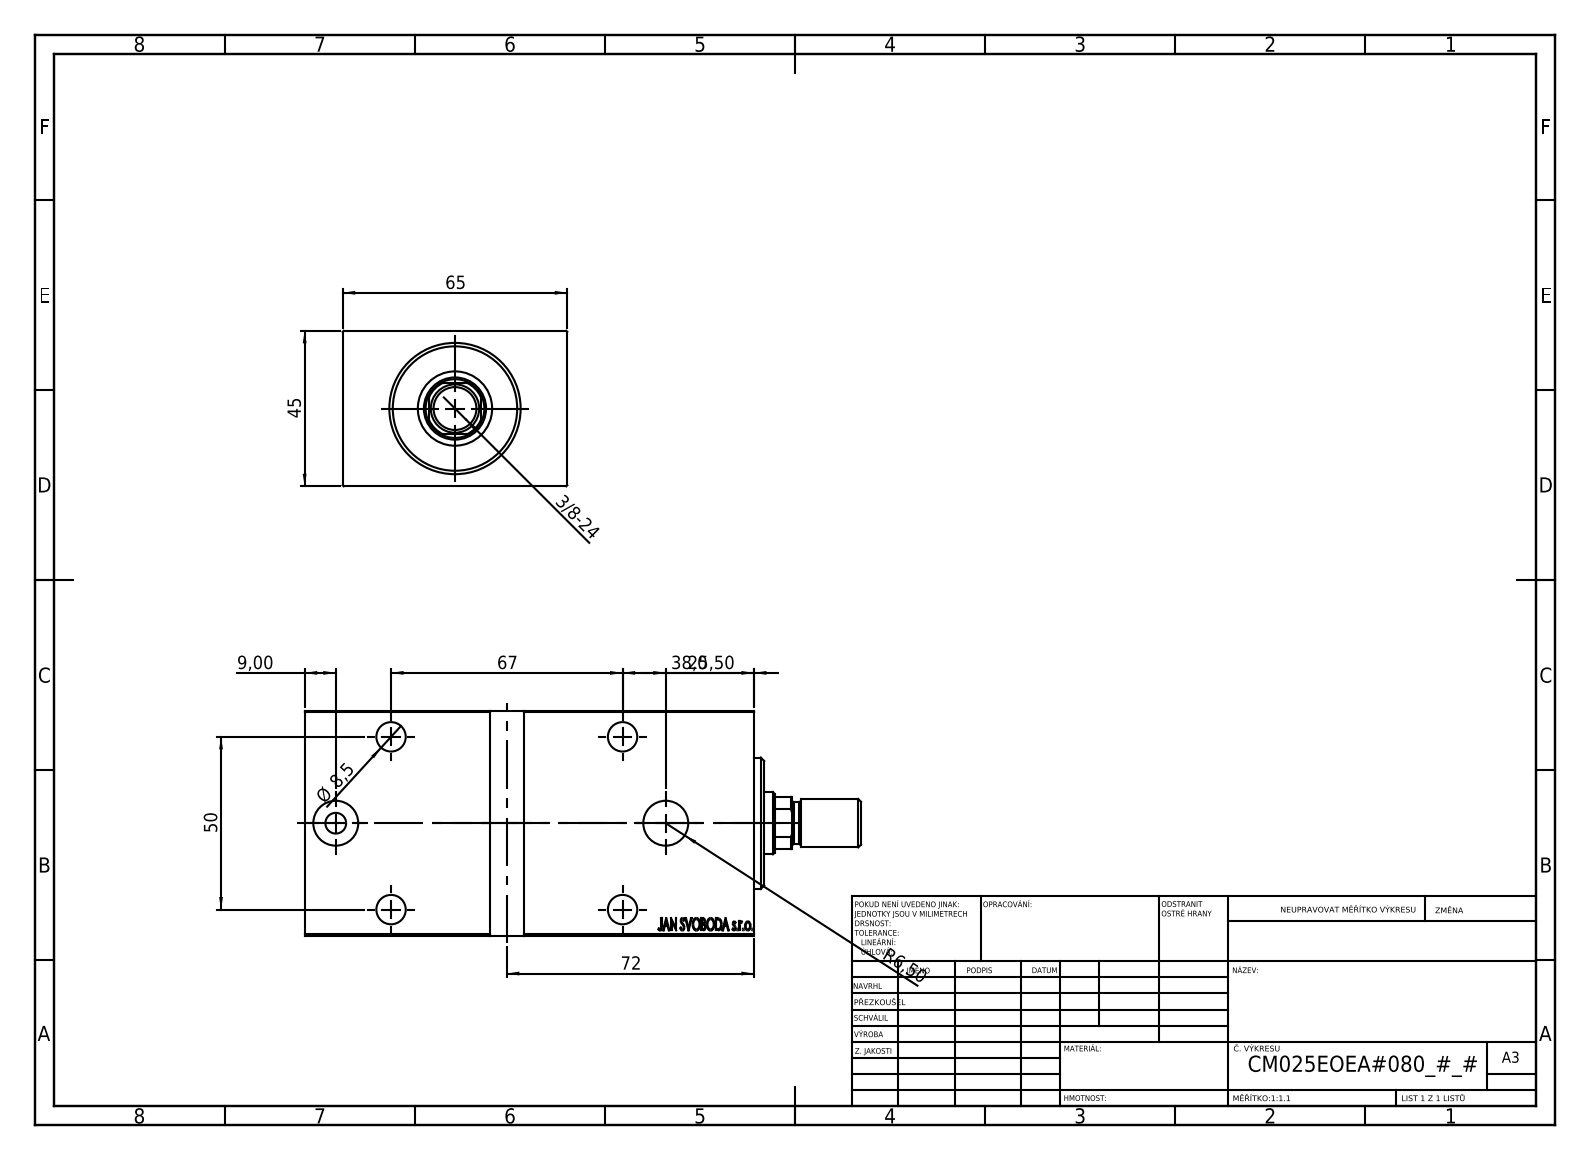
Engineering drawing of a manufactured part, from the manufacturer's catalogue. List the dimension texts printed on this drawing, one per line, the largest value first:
72
67
65
50
45
38,0
25,50
9,00
Ø 8,5
R6,50
3/8-24
